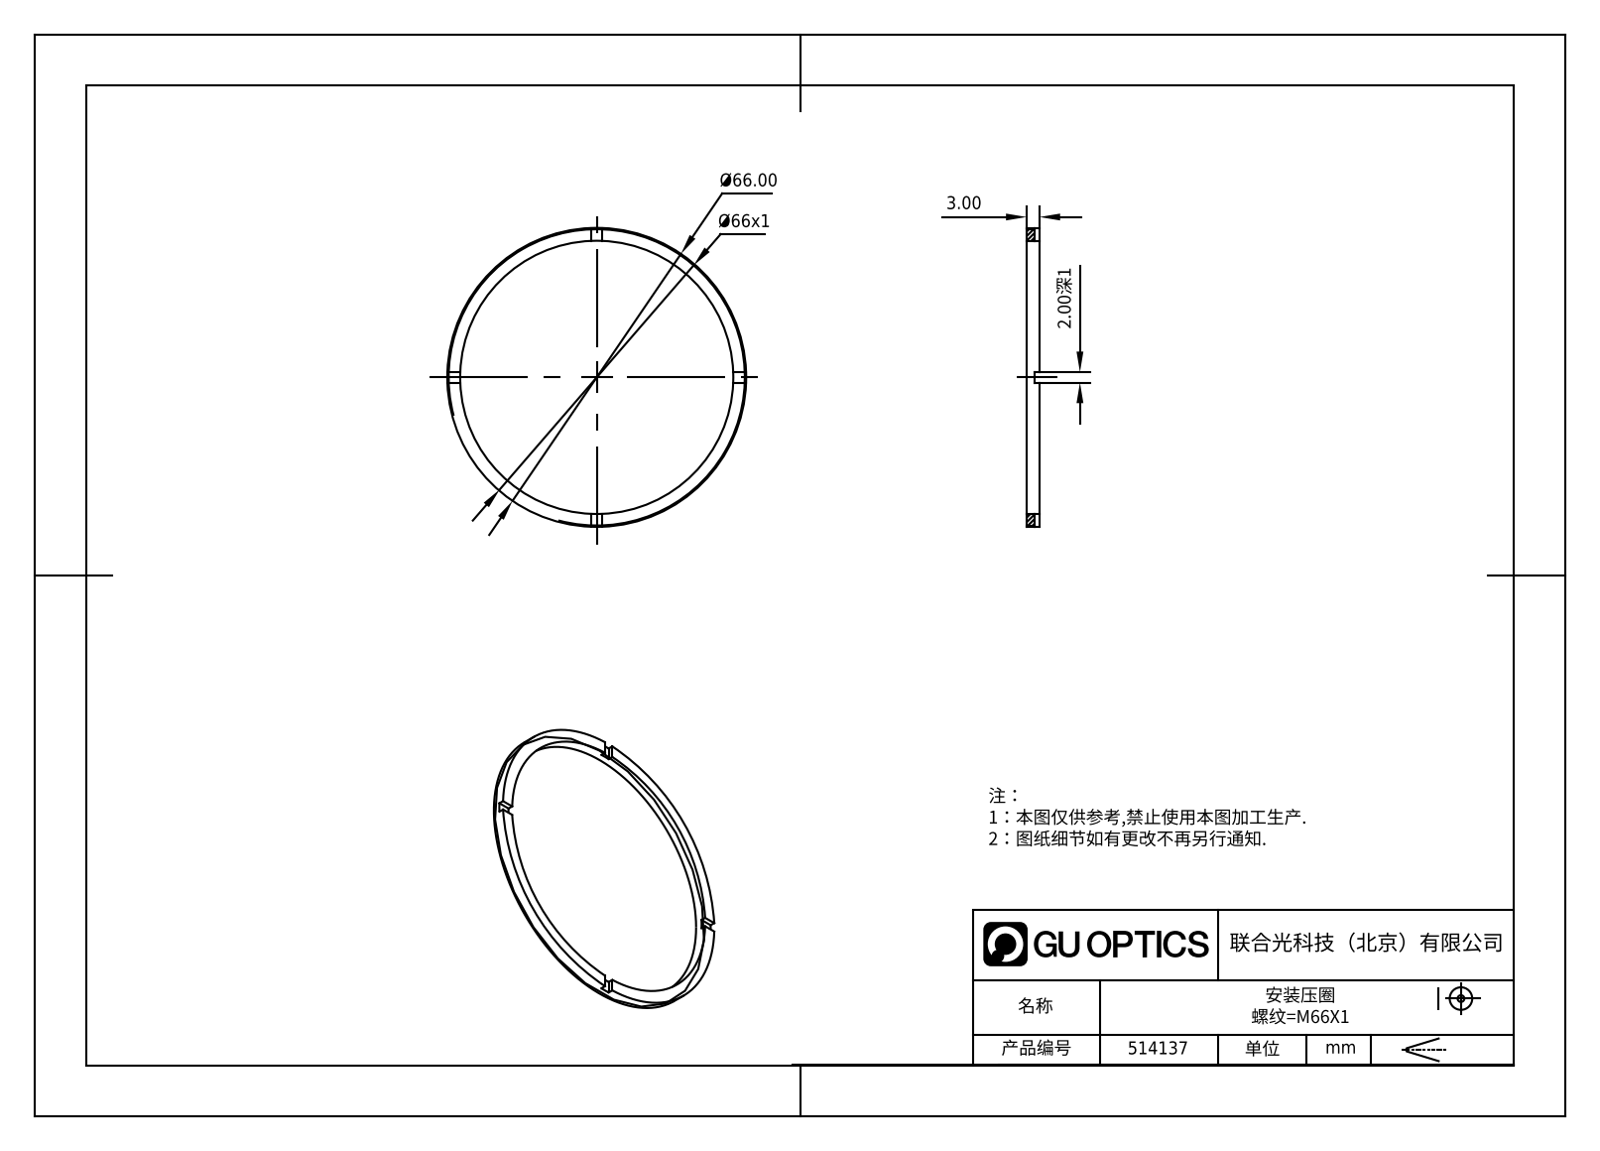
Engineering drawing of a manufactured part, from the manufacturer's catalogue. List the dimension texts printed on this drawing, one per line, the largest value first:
Ø66.00
Ø66x1
3.00
2.00深1
